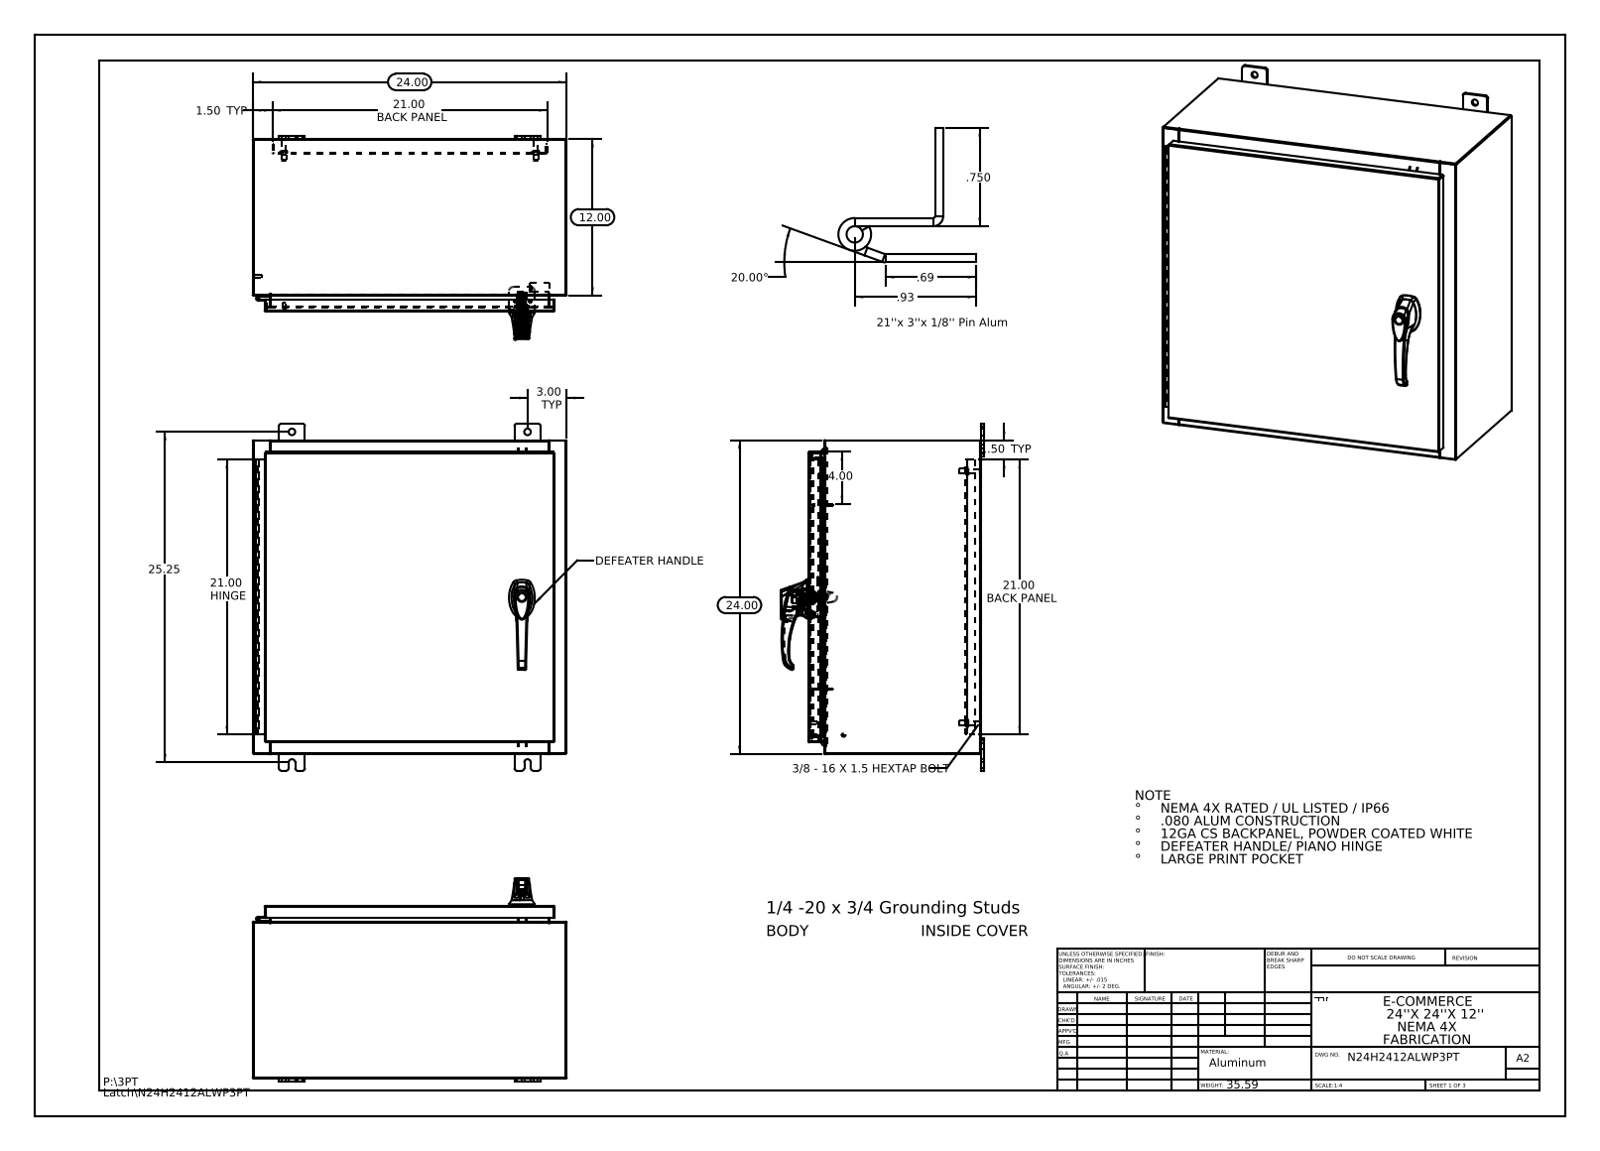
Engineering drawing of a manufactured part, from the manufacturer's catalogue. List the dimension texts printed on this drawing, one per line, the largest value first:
25.25
24.00
24.00
21.00 HINGE
21.00 BACK PANEL
21.00 BACK PANEL
20.00°
12.00
4.00
3.00 TYP
1.50 TYP
1.50 TYP
.93
.750
.69
